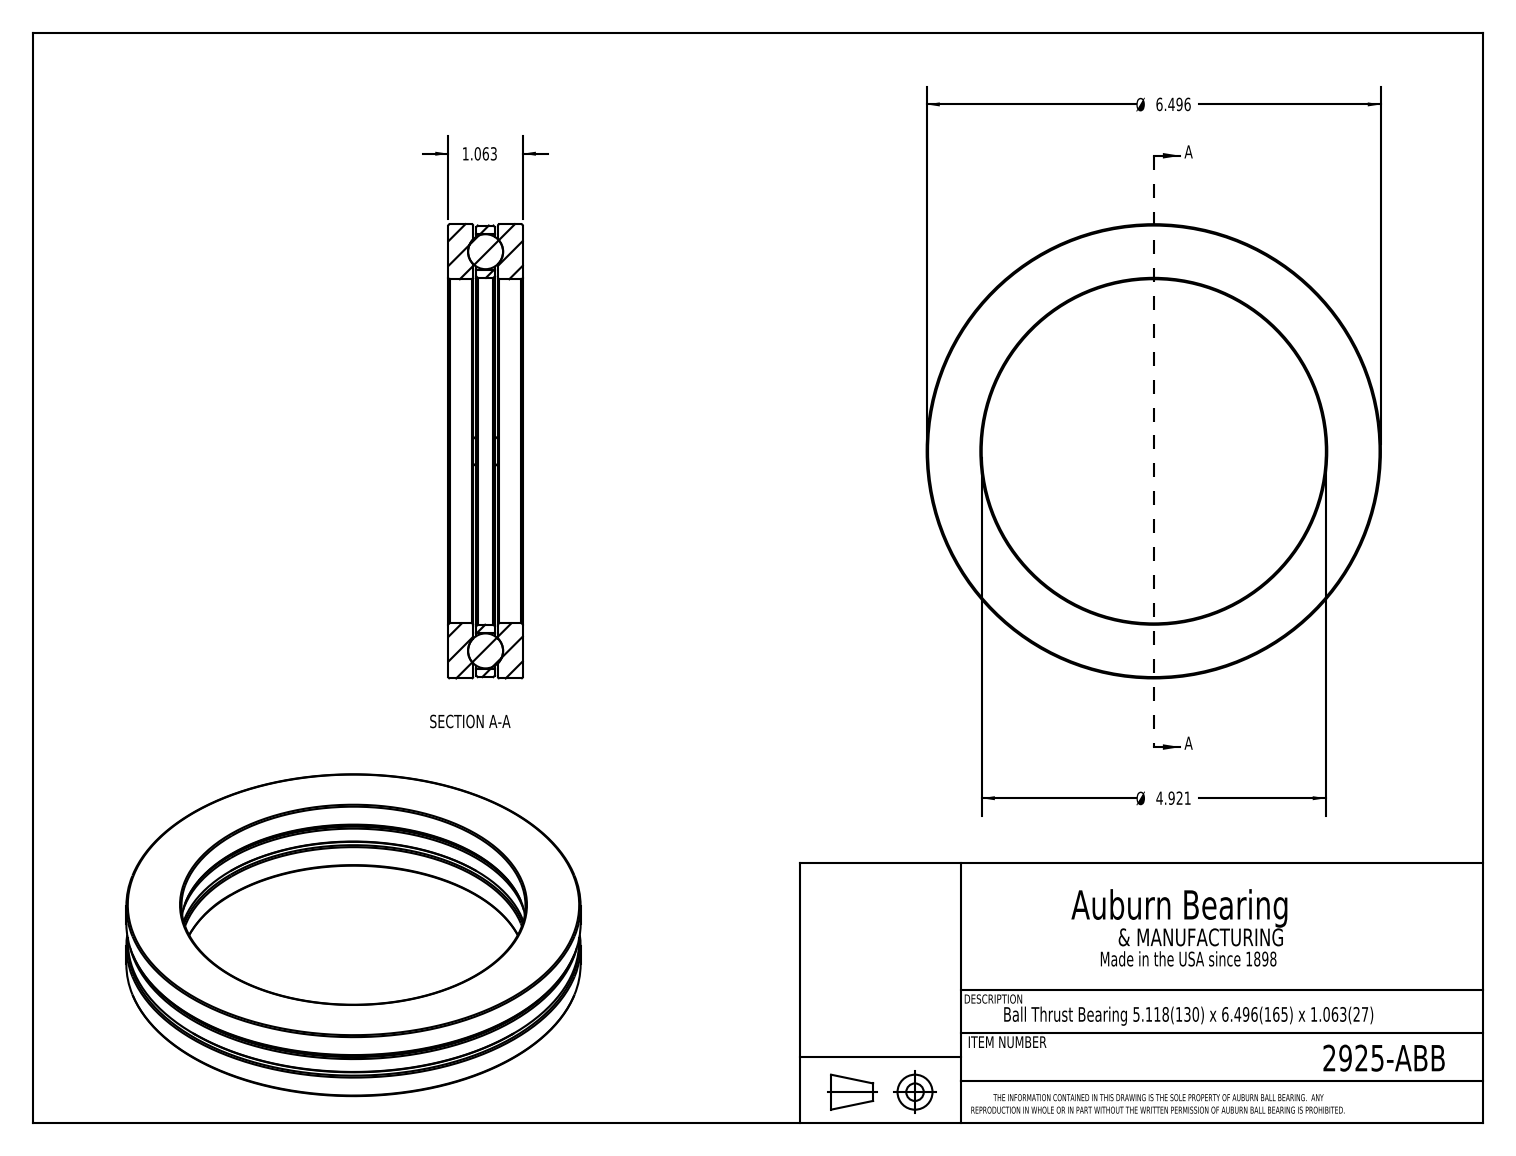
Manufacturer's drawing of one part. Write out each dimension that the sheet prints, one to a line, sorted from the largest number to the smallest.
Ø 6.496
Ø 4.921
1.063
